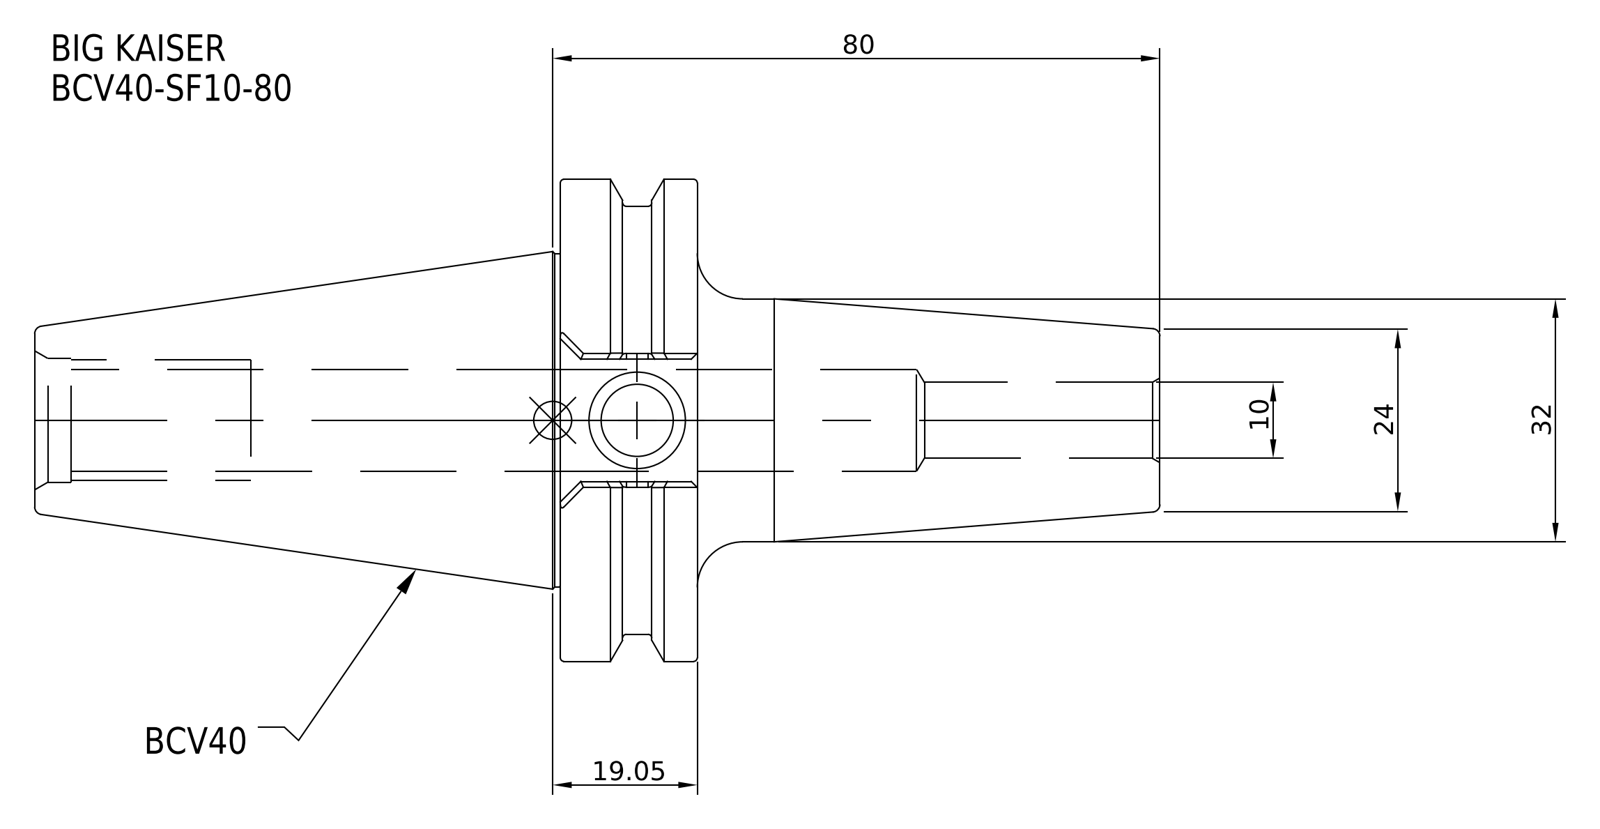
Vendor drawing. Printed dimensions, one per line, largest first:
80
32
24
19.05
10
